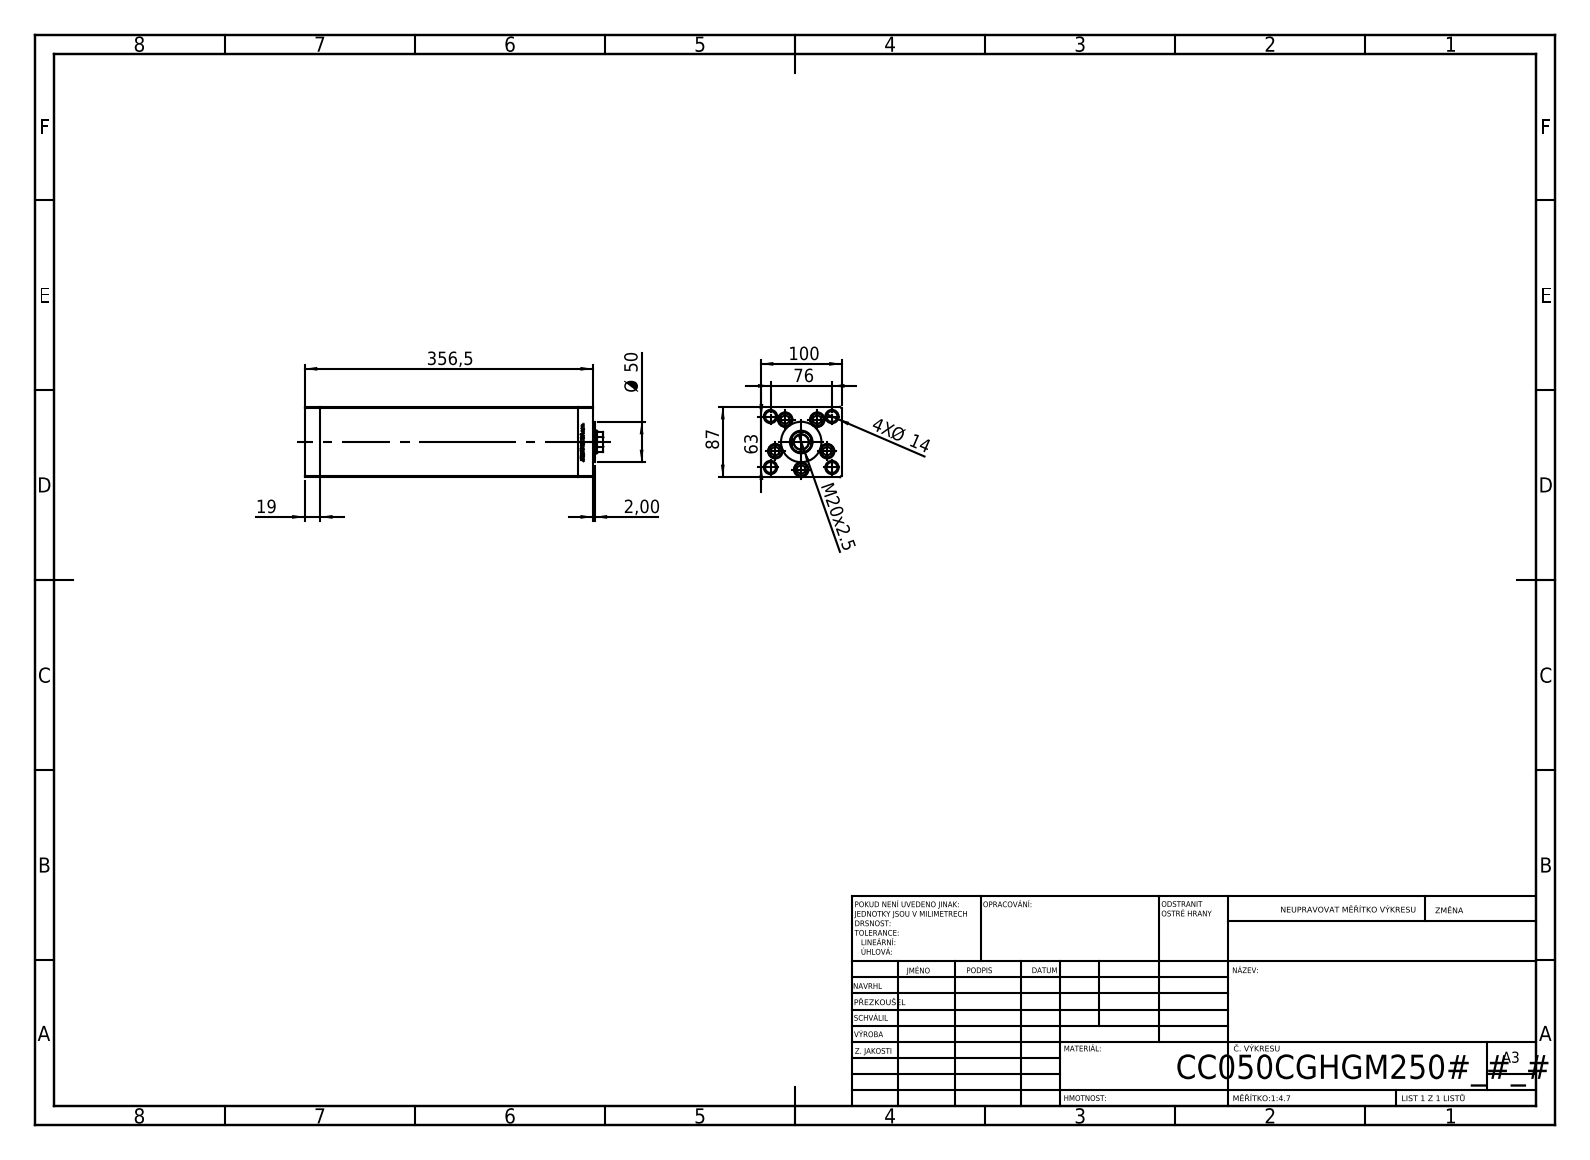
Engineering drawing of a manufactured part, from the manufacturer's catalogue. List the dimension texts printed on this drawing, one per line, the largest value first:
356,5
100
87
76
63
Ø 50
M20x2.5
19
4X Ø 14
2,00
